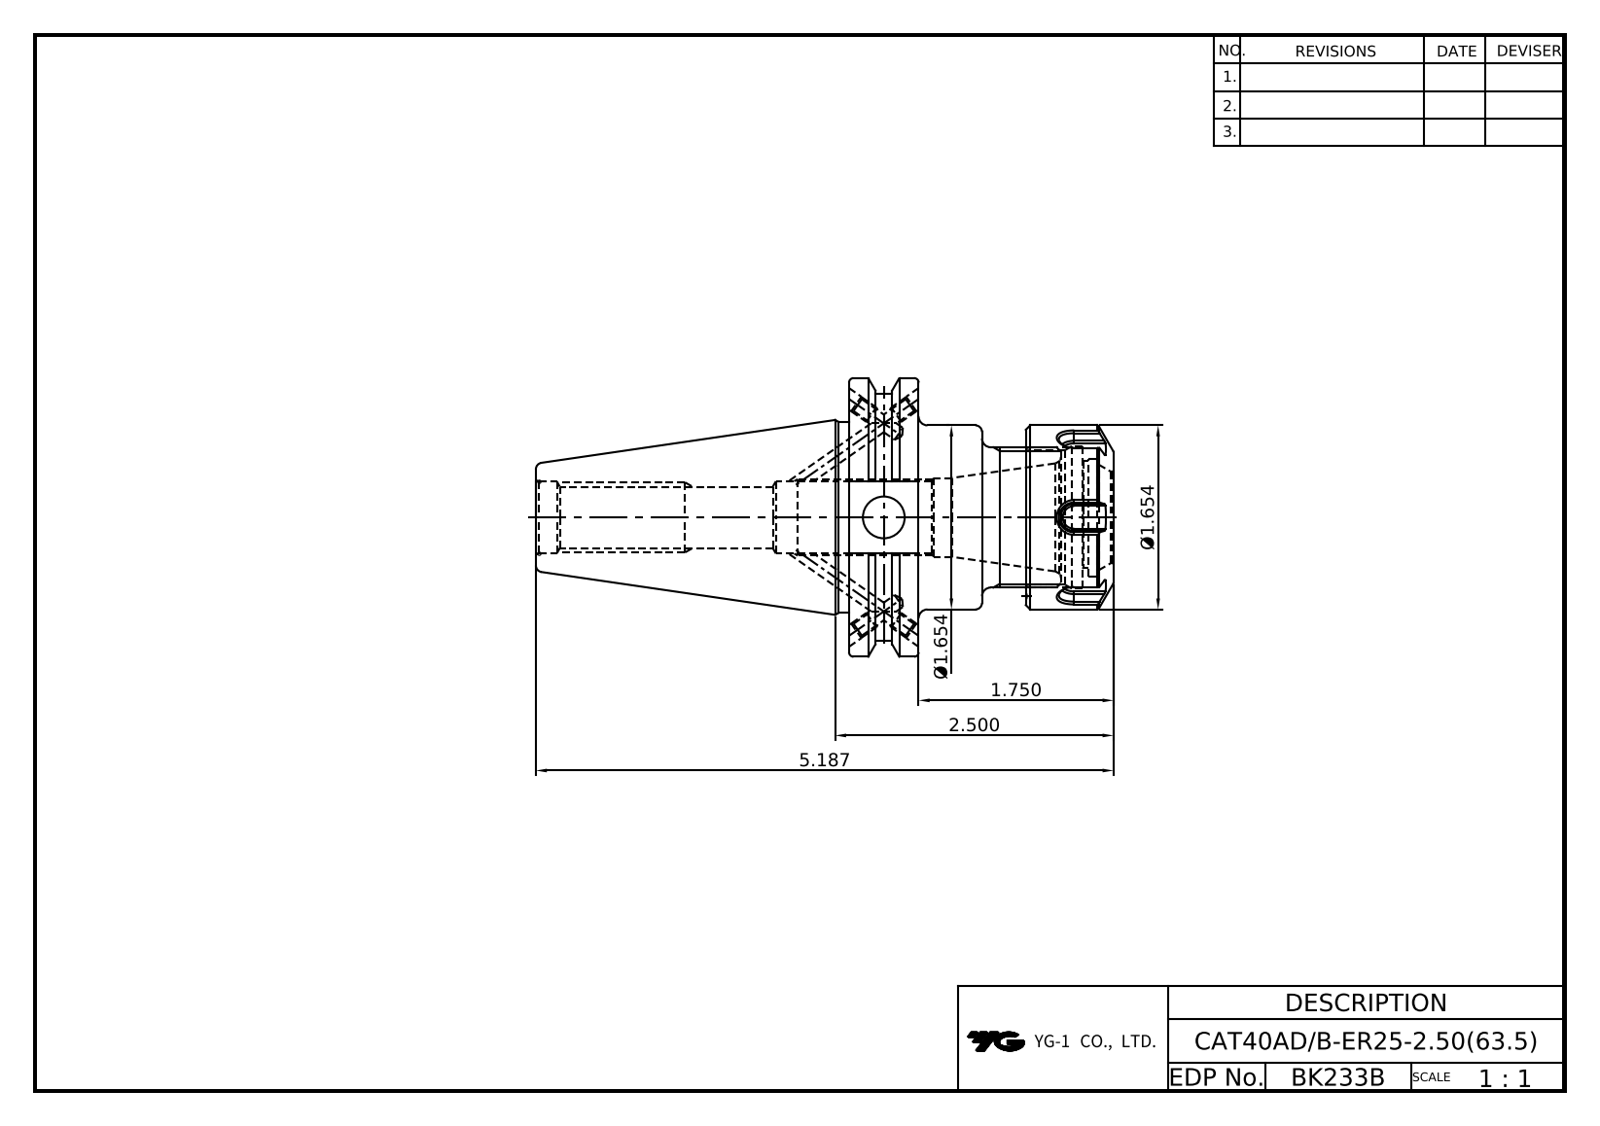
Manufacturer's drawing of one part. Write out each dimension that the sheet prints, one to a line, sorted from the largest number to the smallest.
5.187
2.500
1.750
Ø1.654
Ø1.654
